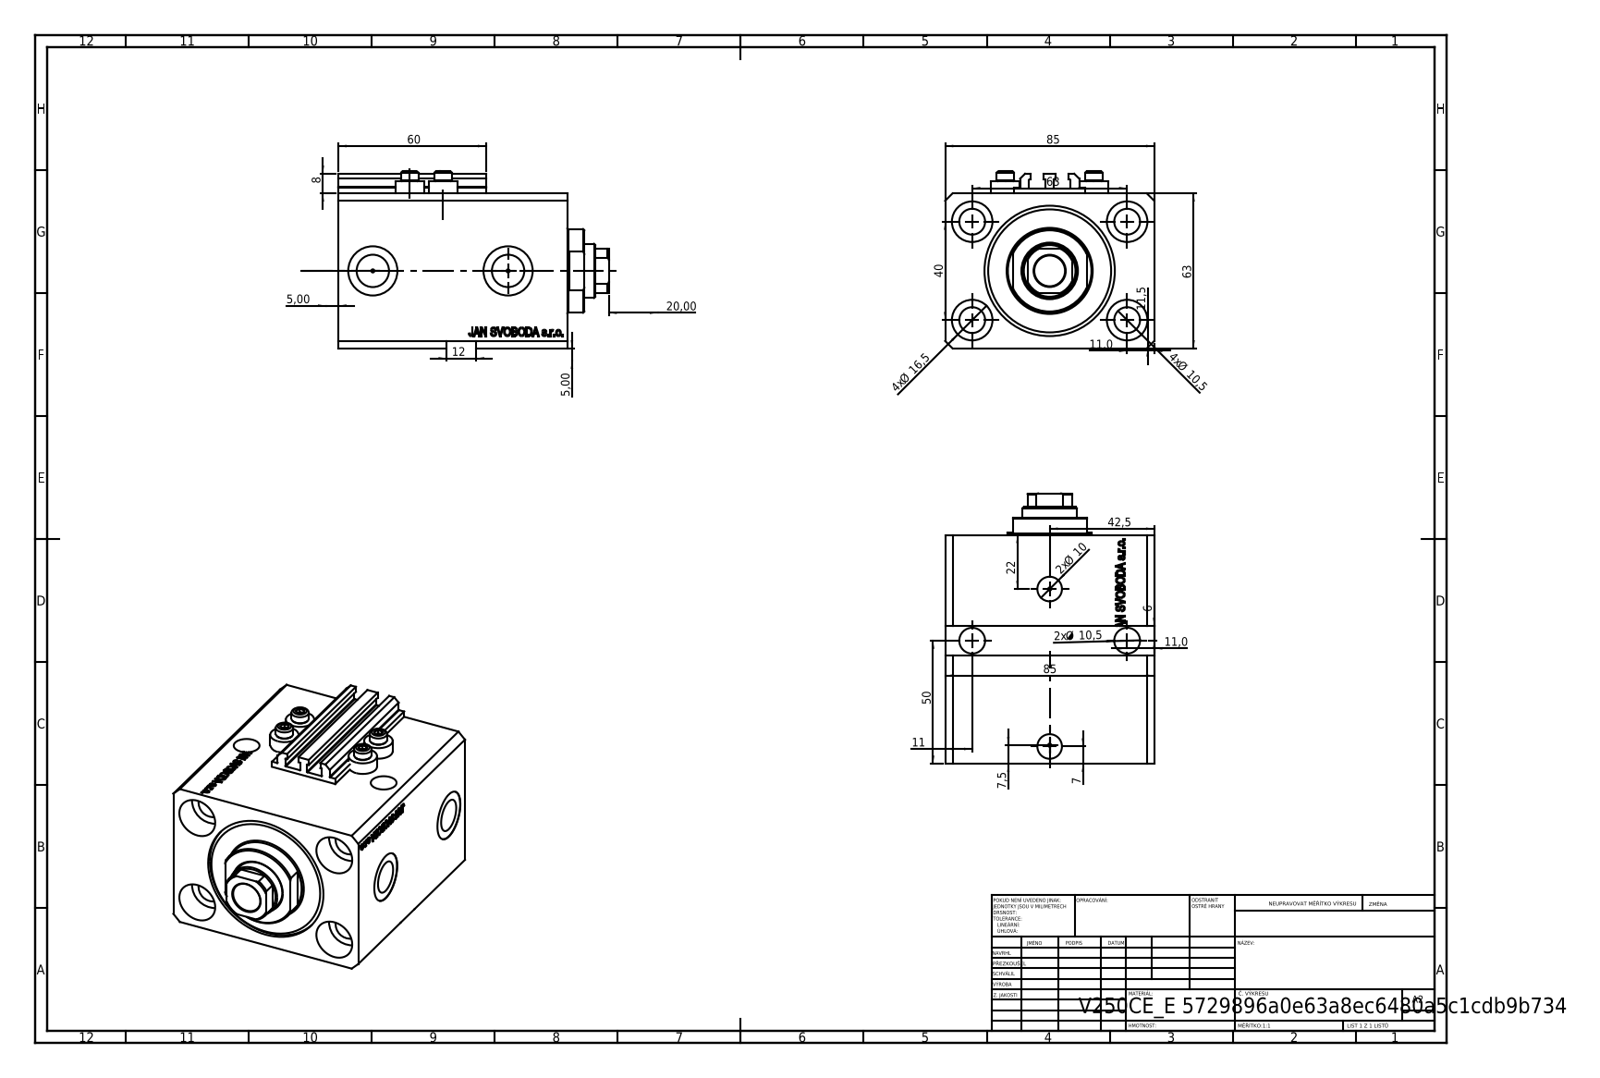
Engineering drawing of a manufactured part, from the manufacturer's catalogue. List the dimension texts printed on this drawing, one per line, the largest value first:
85
85
63
63
60
50
42,5
40
22
20,00
4x Ø 16,5
12
11,5
11,0
11,0
11
4x Ø 10,5
2x Ø 10,5
2x Ø 10
8
7,5
7
6
5,00
5,00
